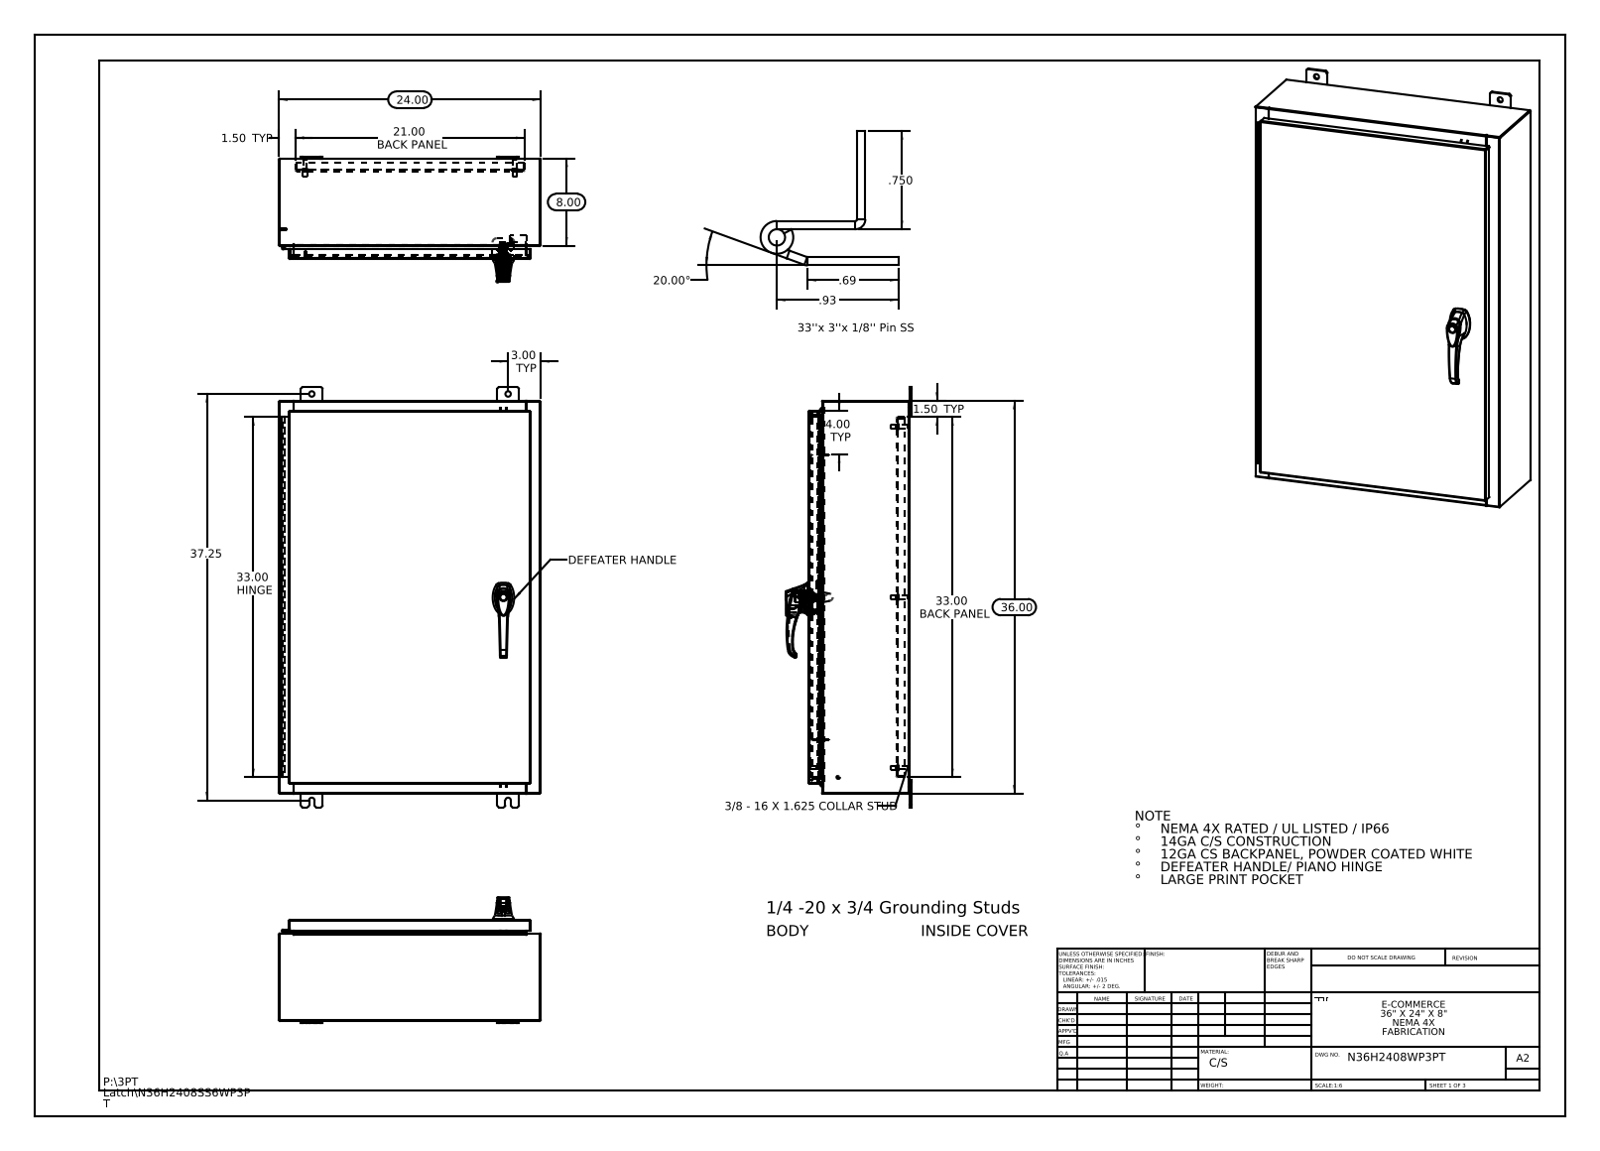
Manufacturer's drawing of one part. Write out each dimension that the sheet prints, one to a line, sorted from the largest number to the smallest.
37.25
36.00
33.00 HINGE
33.00 BACK PANEL
24.00
21.00 BACK PANEL
20.00°
8.00
4.00 TYP
3.00 TYP
1.50 TYP
1.50 TYP
.93
.750
.69
